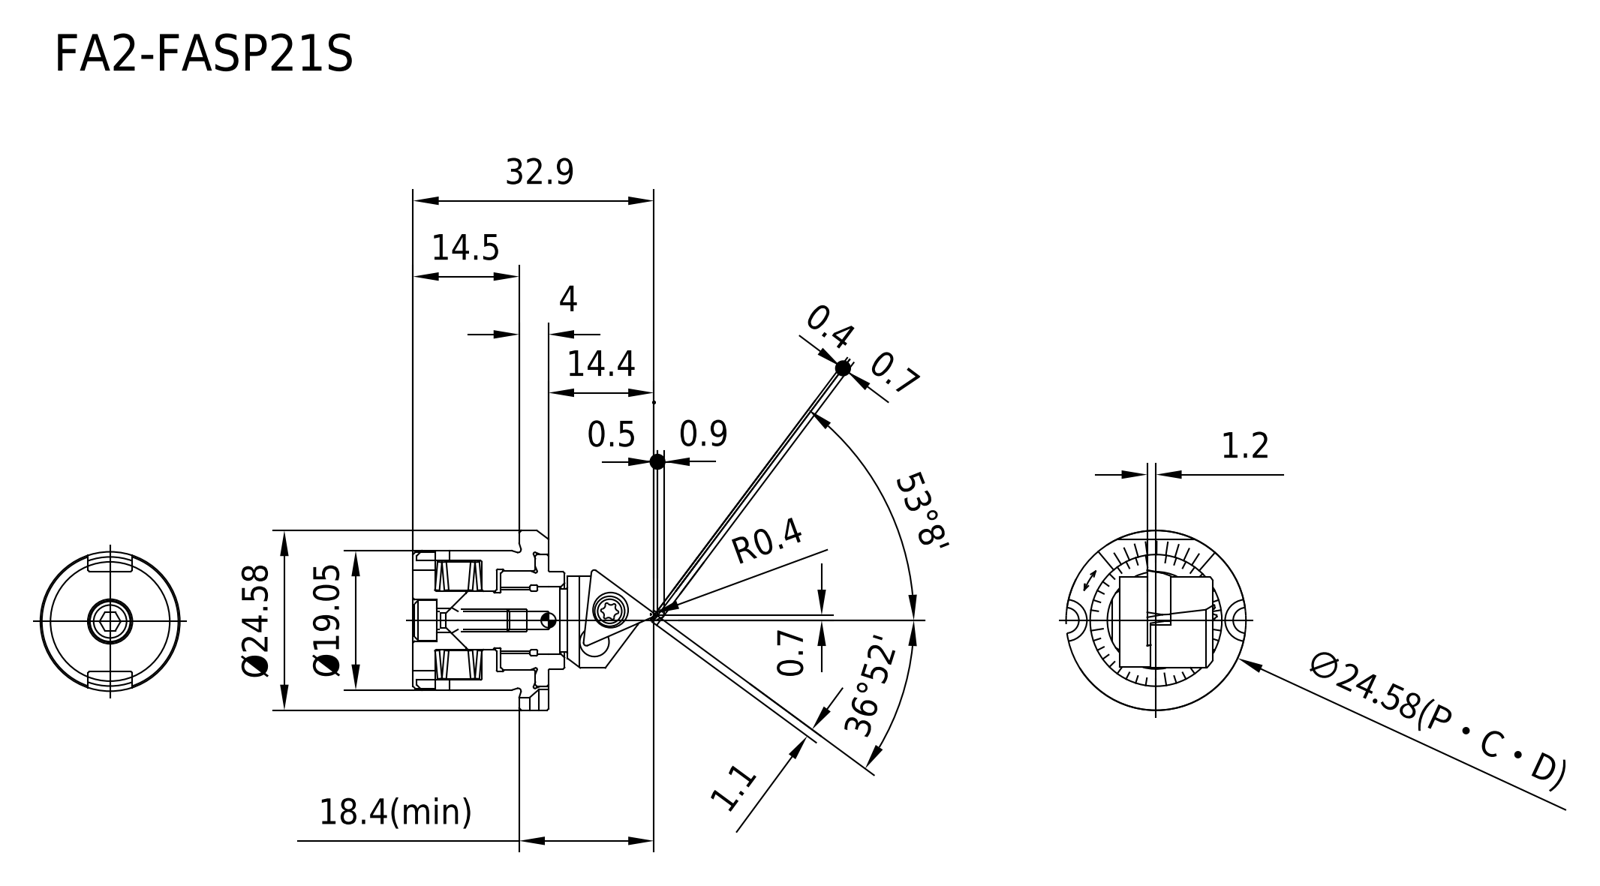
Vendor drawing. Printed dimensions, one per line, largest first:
53°8'
36°52'
32.9
Ø24.58
∅24.58(P・C・D)
Ø19.05
18.4(min)
14.5
14.4
4
1.2
1.1
0.9
0.7
0.7
0.5
R0.4
0.4
